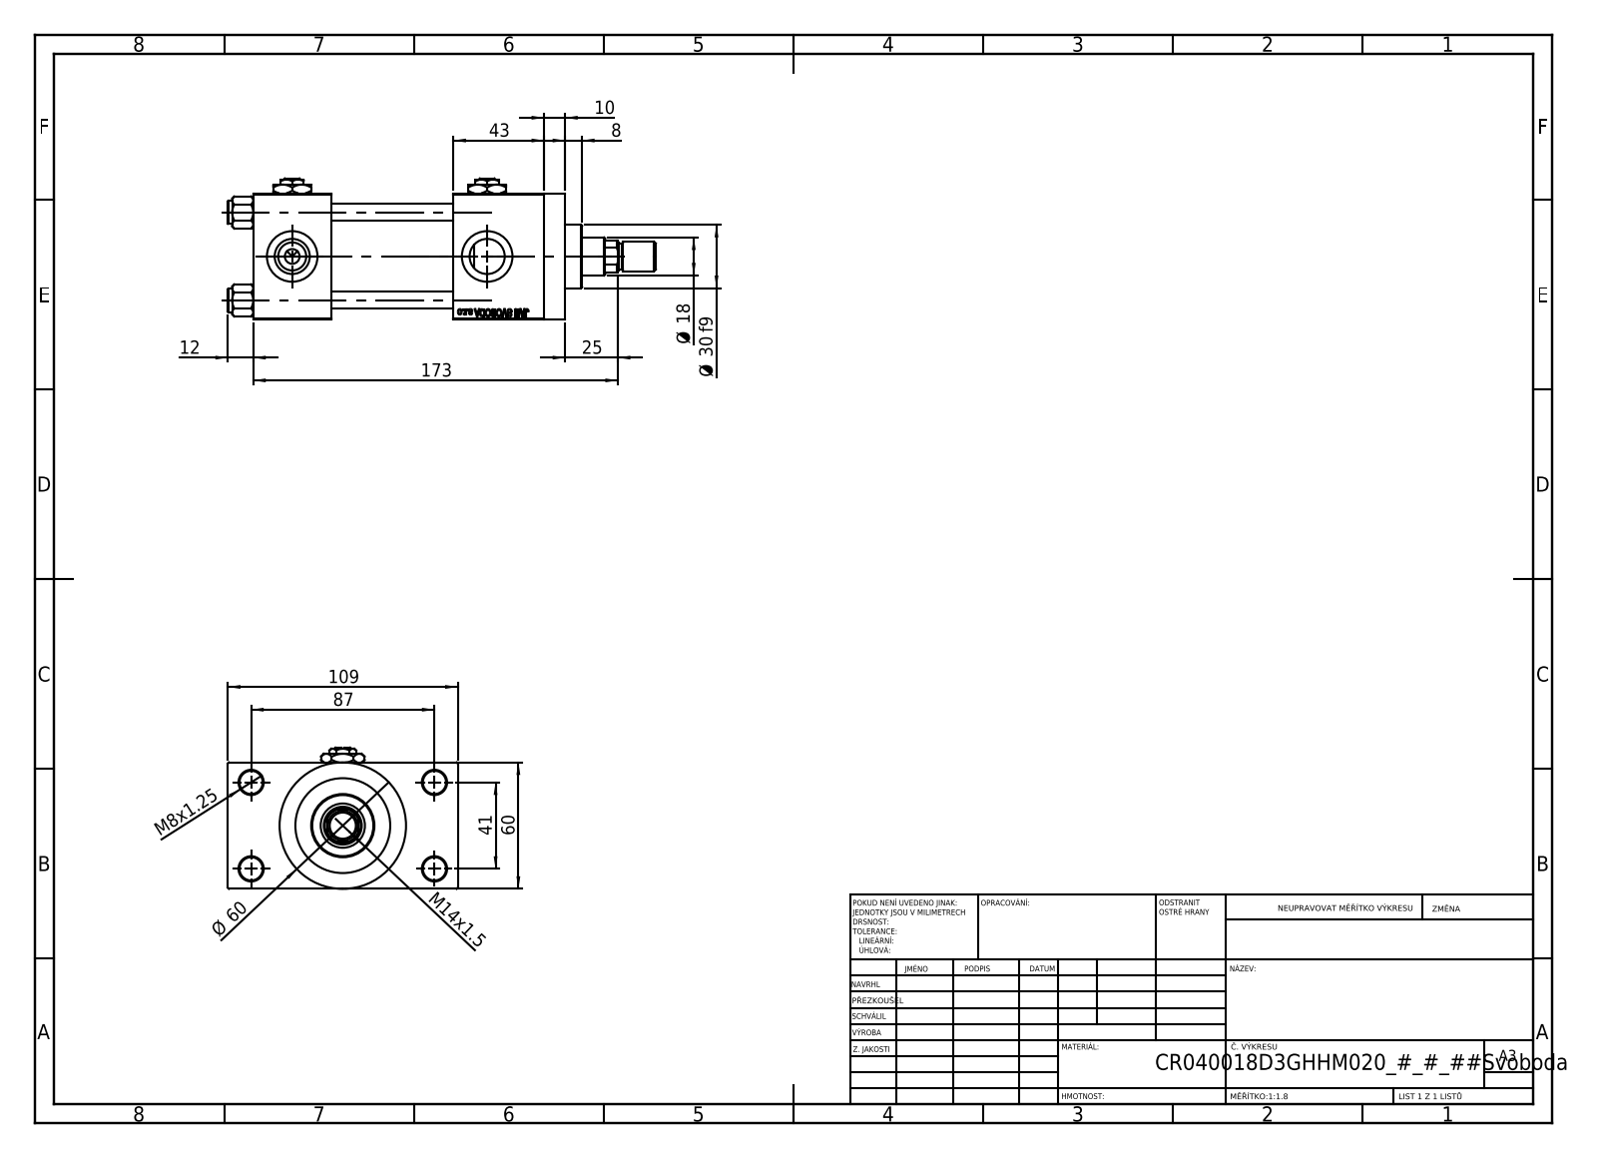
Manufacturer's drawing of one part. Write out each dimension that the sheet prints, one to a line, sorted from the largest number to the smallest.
173
109
87
Ø 60
60
43
41
Ø 30 f9
25
Ø 18
M14x1.5
12
10
8
M8x1.25
